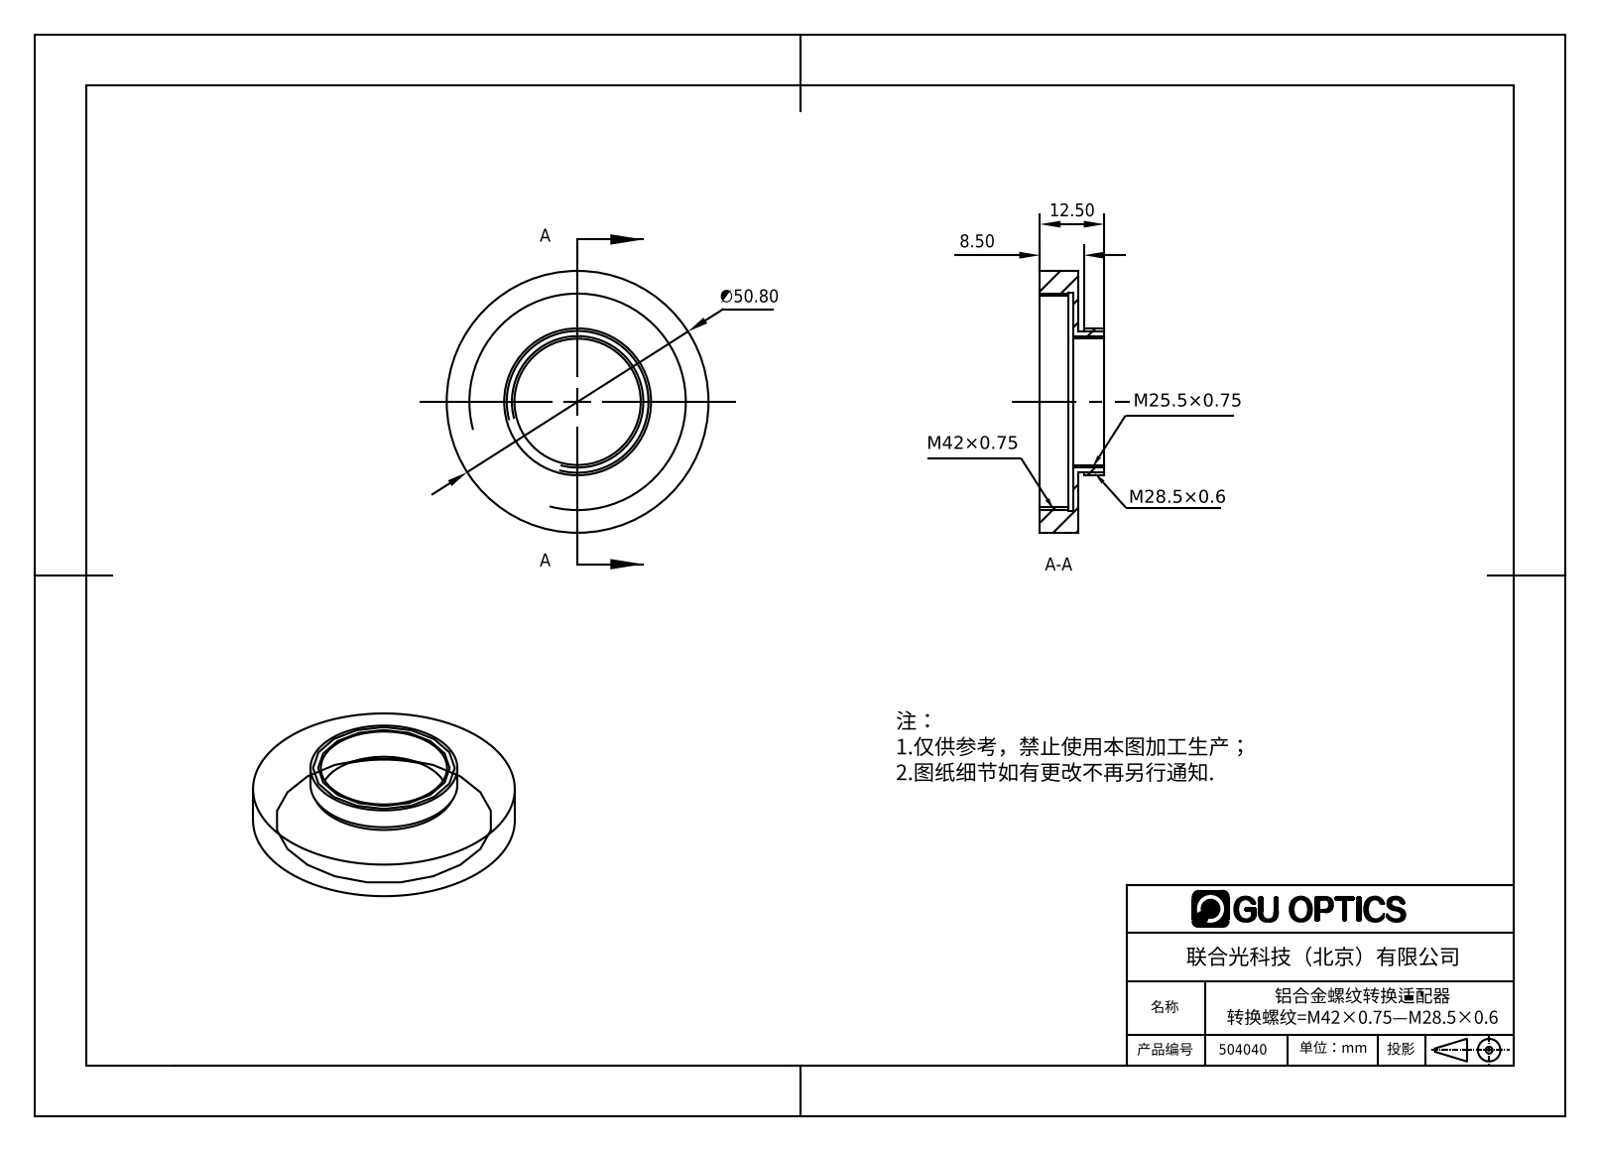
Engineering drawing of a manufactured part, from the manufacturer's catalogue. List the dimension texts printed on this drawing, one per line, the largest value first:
∅50.80
12.50
8.50
